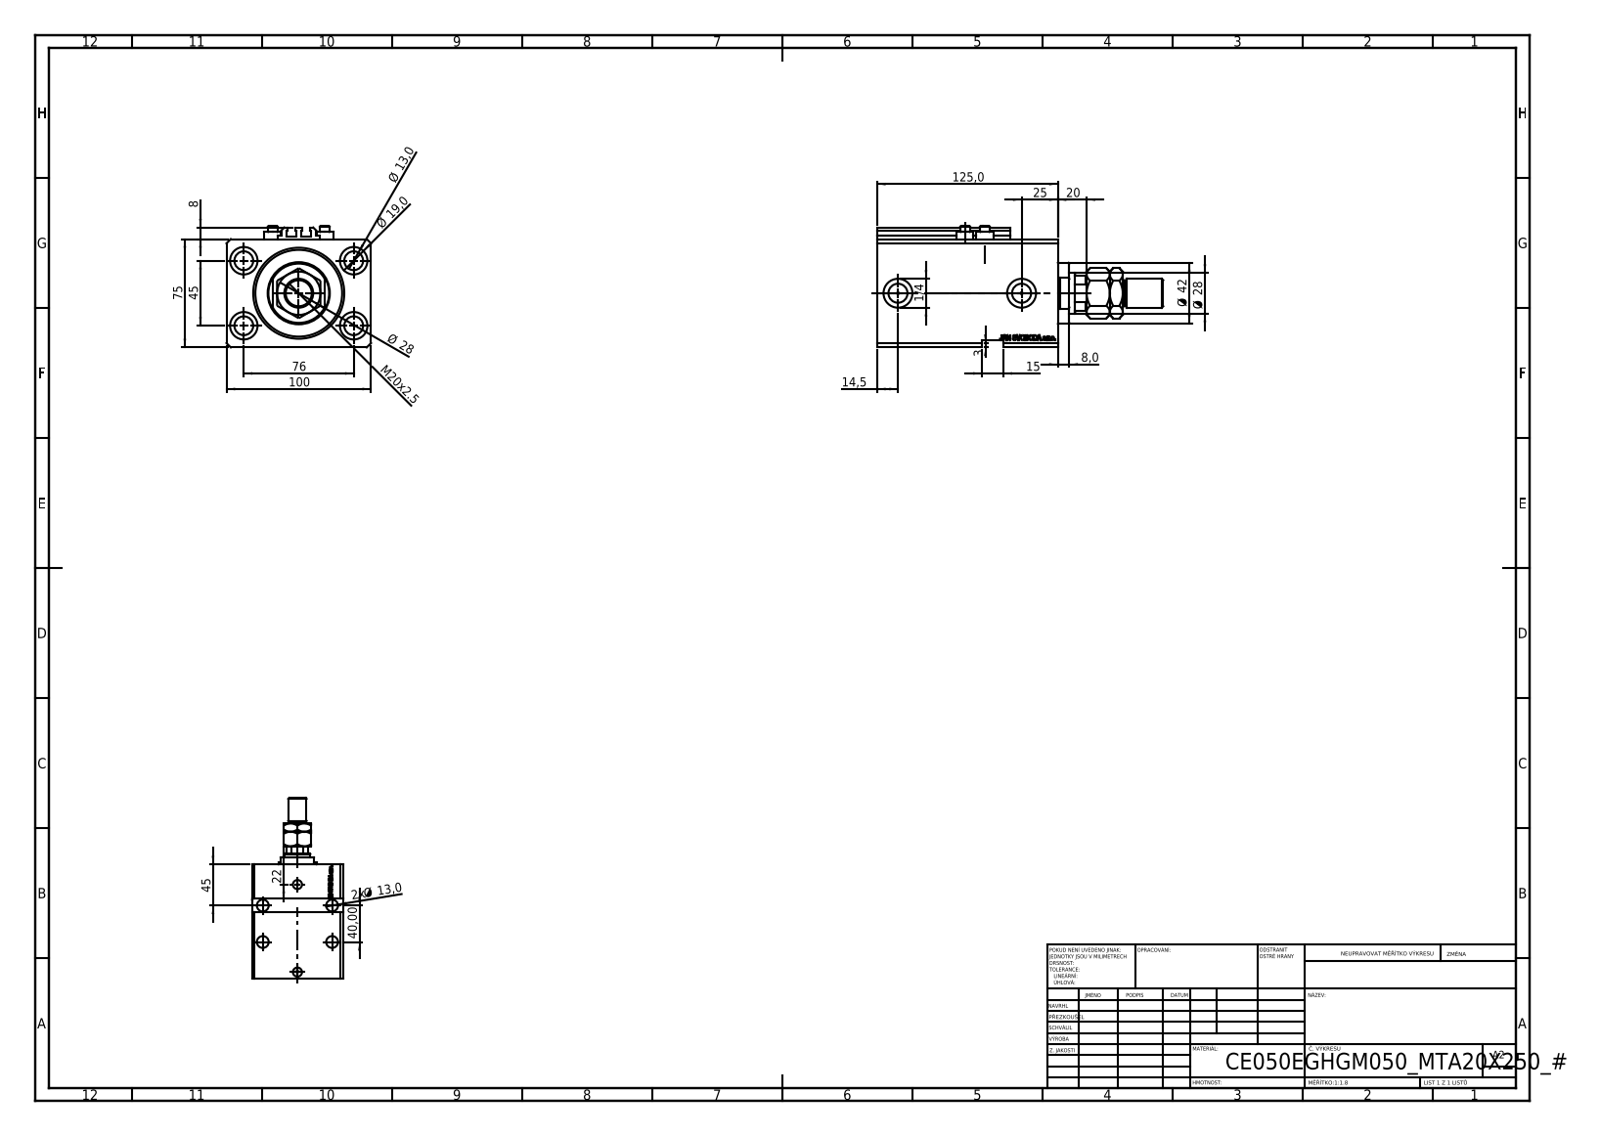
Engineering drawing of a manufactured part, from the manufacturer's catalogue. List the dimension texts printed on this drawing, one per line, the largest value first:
125,0
100
76
75
45
45
Ø 42
40,00
Ø 28
Ø 28
25
22
M20x2.5
20
Ø 19,0
15
14,5
Ø 13,0
2x Ø 13,0
8
8,0
3
1/4
